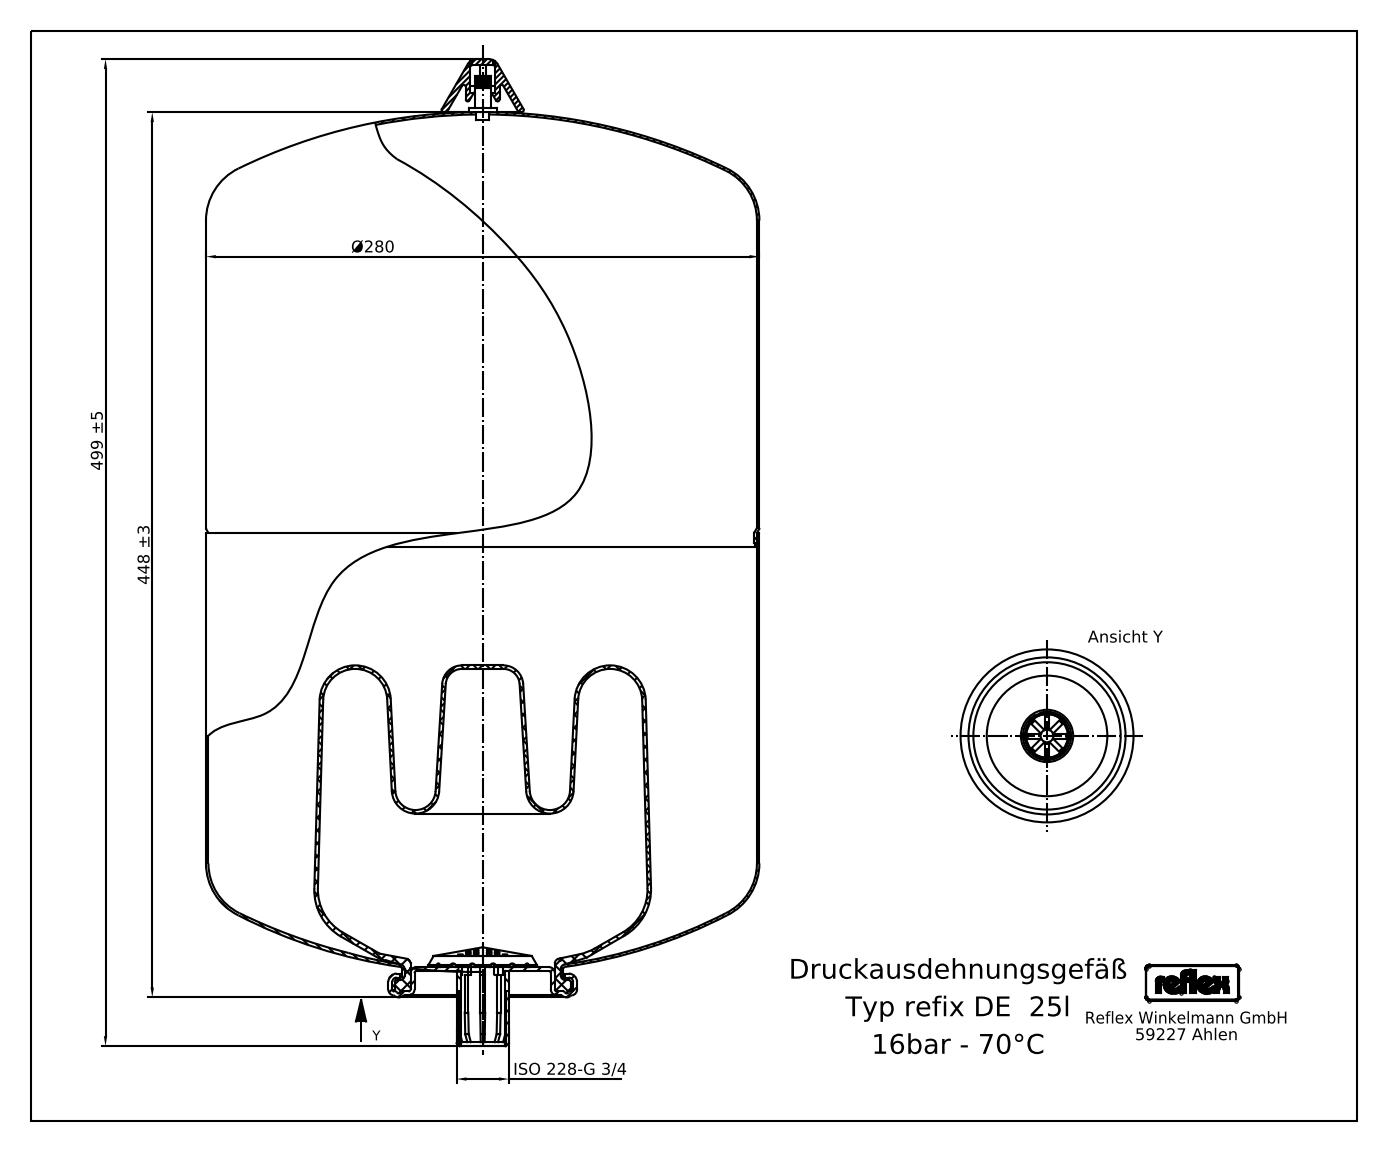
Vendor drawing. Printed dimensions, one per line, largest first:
499 ±5
448 ±3
Ø280
ISO 228-G 3/4
